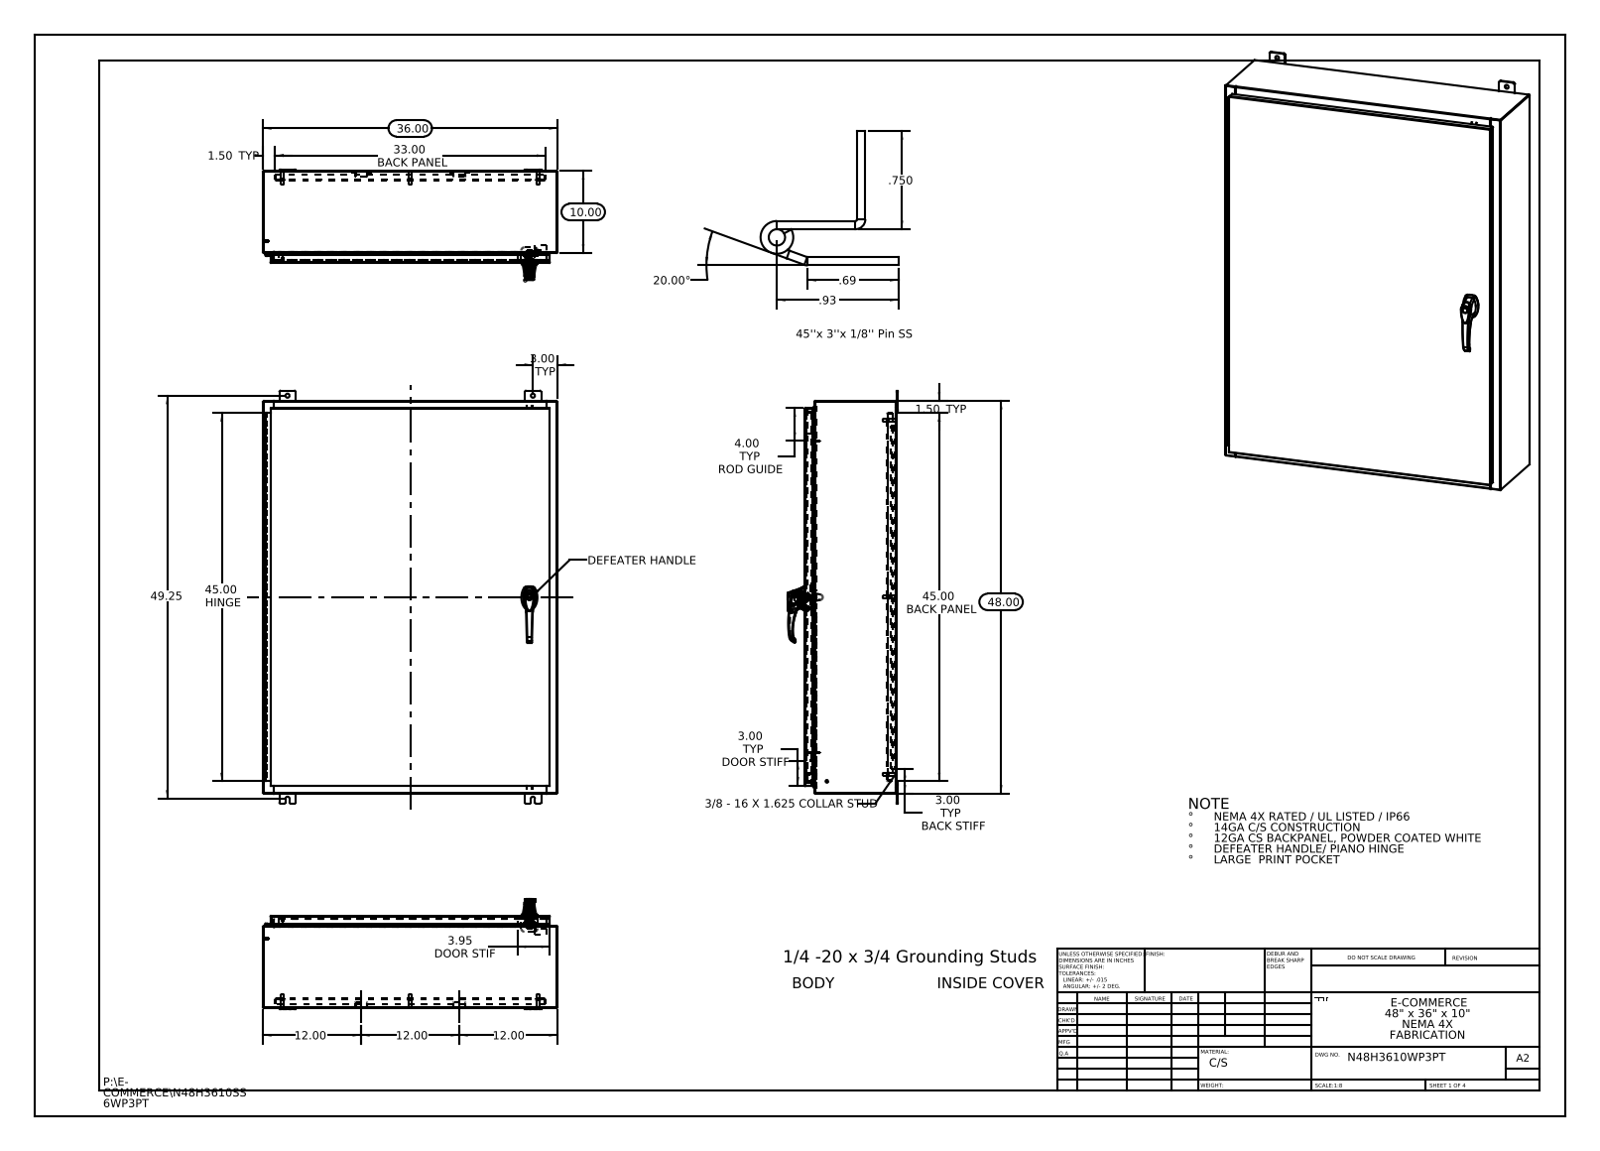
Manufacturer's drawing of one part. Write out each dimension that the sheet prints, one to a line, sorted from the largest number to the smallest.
49.25
48.00
45.00 HINGE
45.00 BACK PANEL
36.00
33.00 BACK PANEL
20.00°
12.00
12.00
12.00
10.00
4.00 TYP ROD GUIDE
3.95 DOOR STIF
3.00 TYP
3.00 TYP DOOR STIFF
3.00 TYP BACK STIFF
1.50 TYP
1.50 TYP
.93
.750
.69
